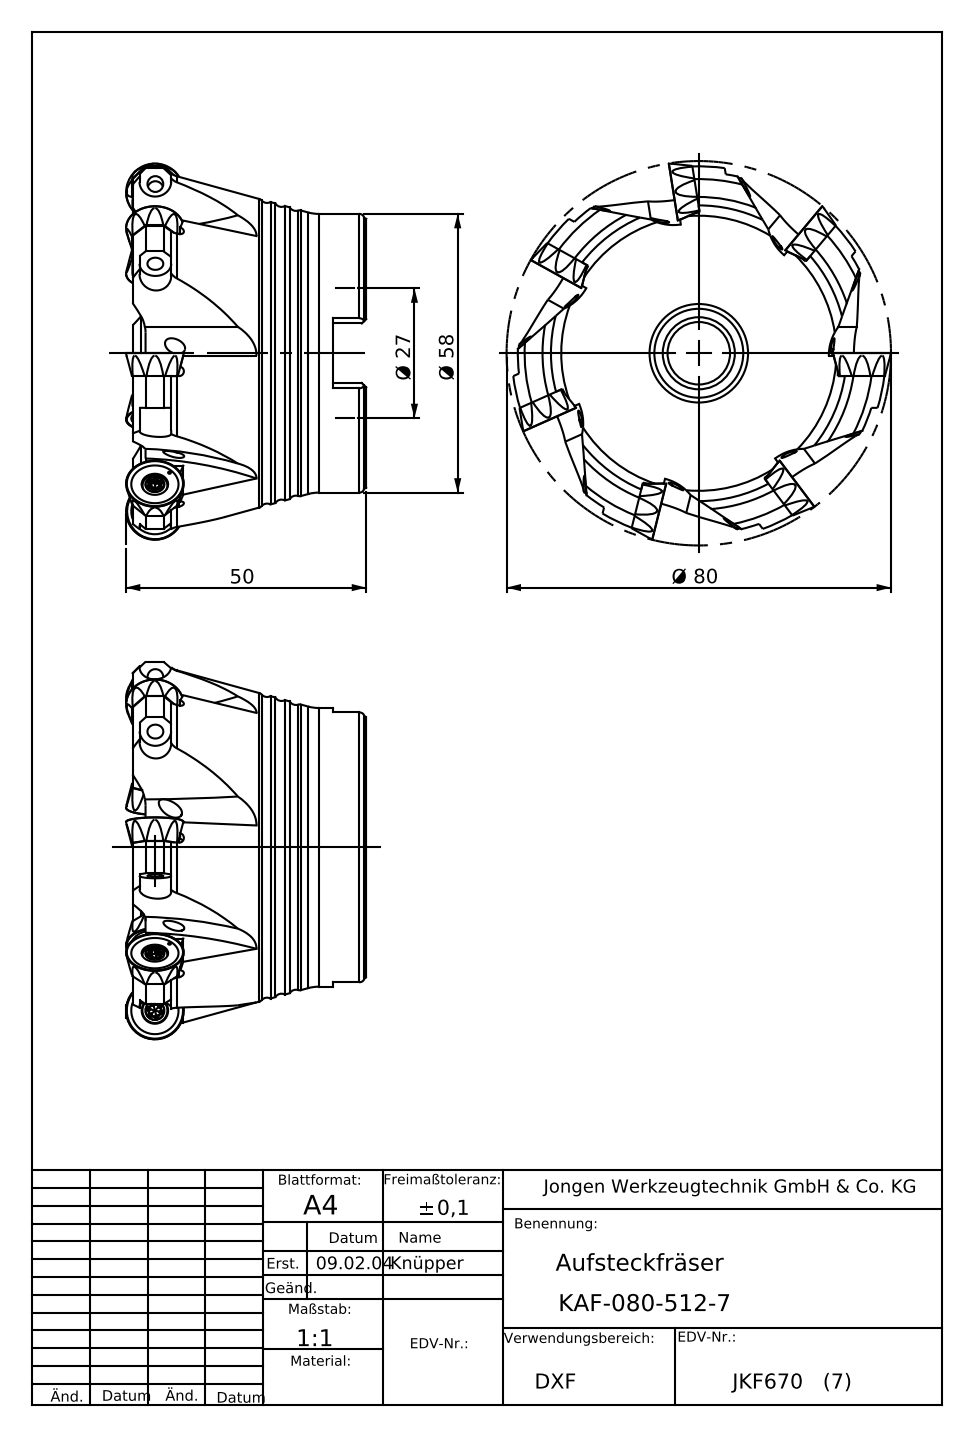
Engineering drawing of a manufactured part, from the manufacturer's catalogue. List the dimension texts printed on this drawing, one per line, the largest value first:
Ø 80
Ø 58
50
Ø 27
